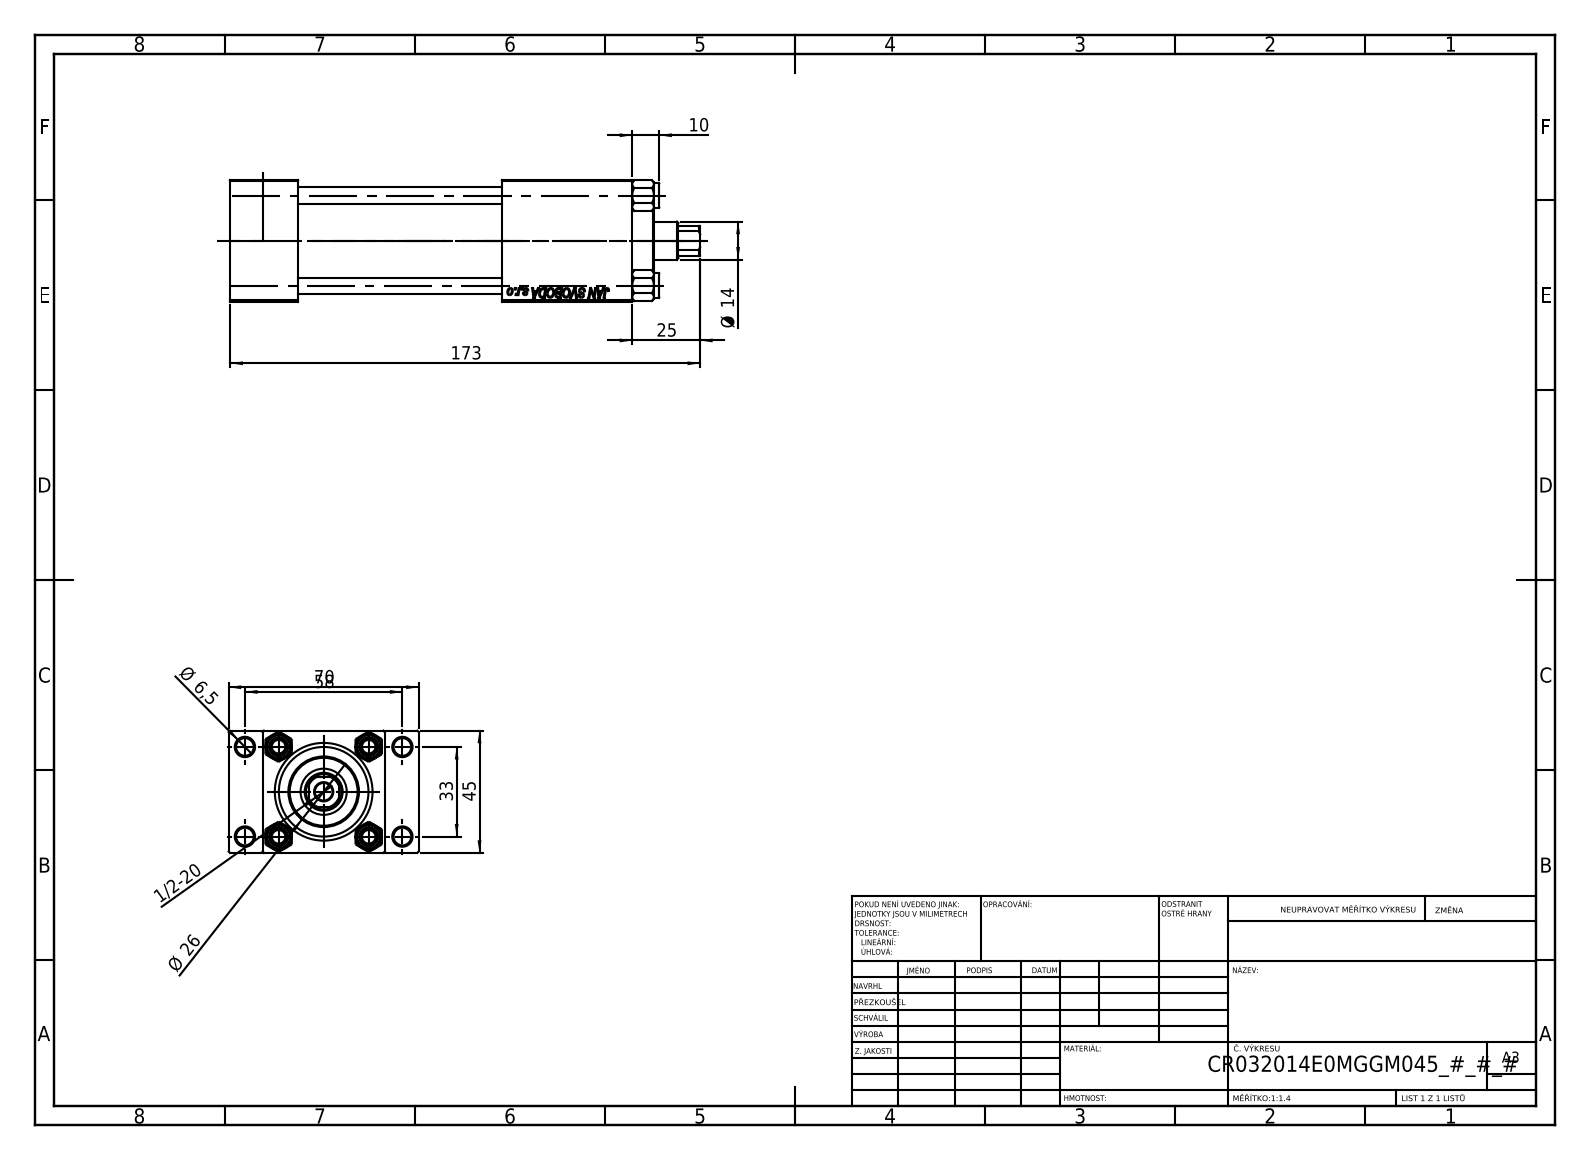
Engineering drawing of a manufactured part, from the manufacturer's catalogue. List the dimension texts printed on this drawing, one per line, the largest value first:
173
70
58
45
33
Ø 26
25
Ø 14
10
Ø 6,5
1/2-20
